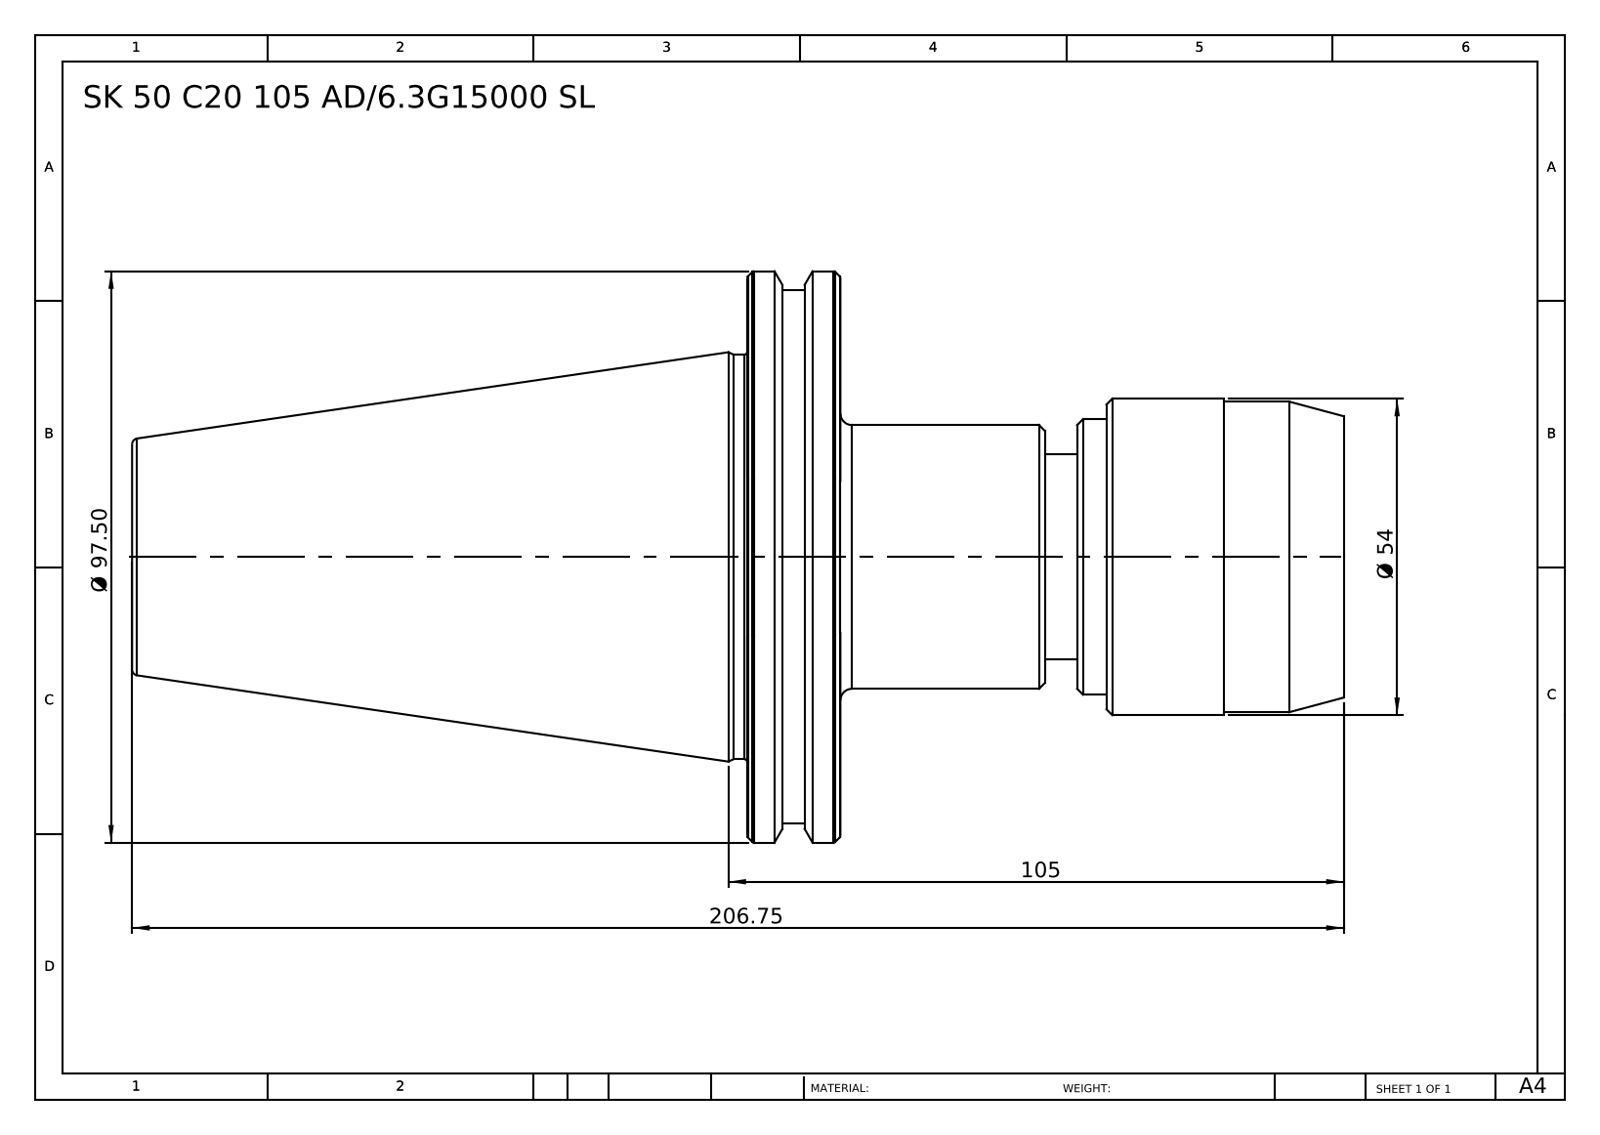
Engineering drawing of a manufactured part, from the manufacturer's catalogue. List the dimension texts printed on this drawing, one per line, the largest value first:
206.75
105
Ø 97.50
Ø 54
